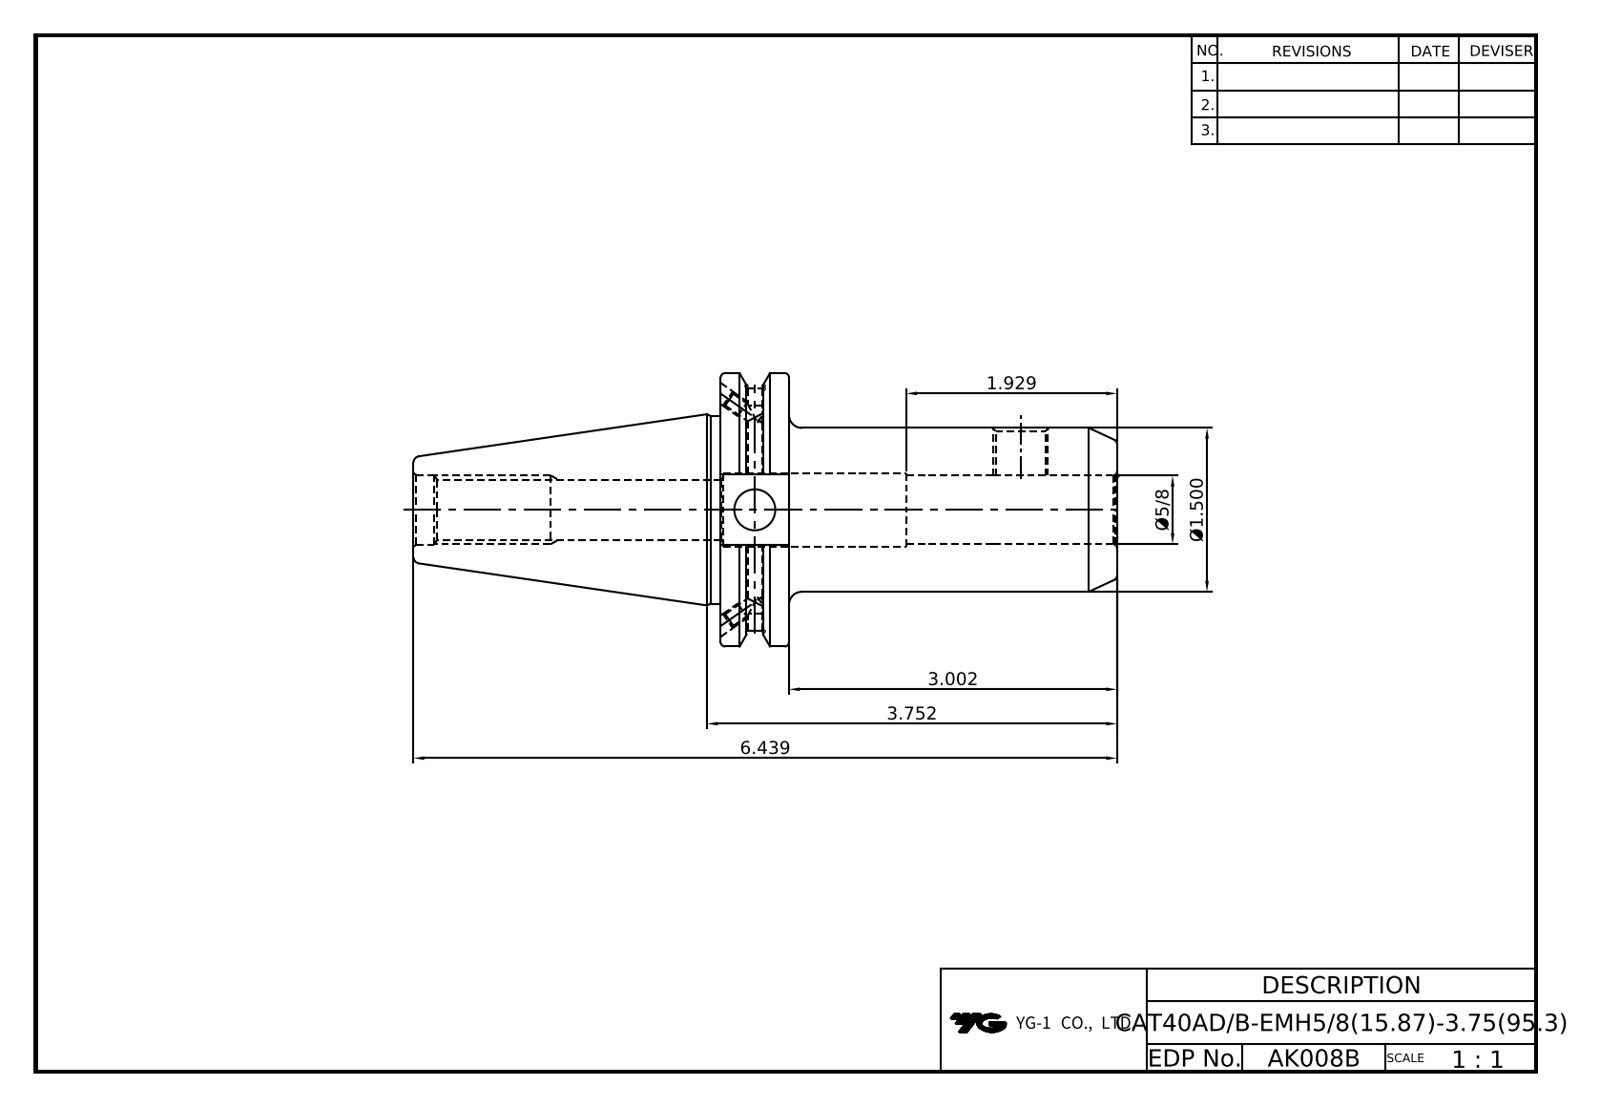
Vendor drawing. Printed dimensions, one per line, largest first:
6.439
3.752
3.002
1.929
Ø1.500
Ø5/8
